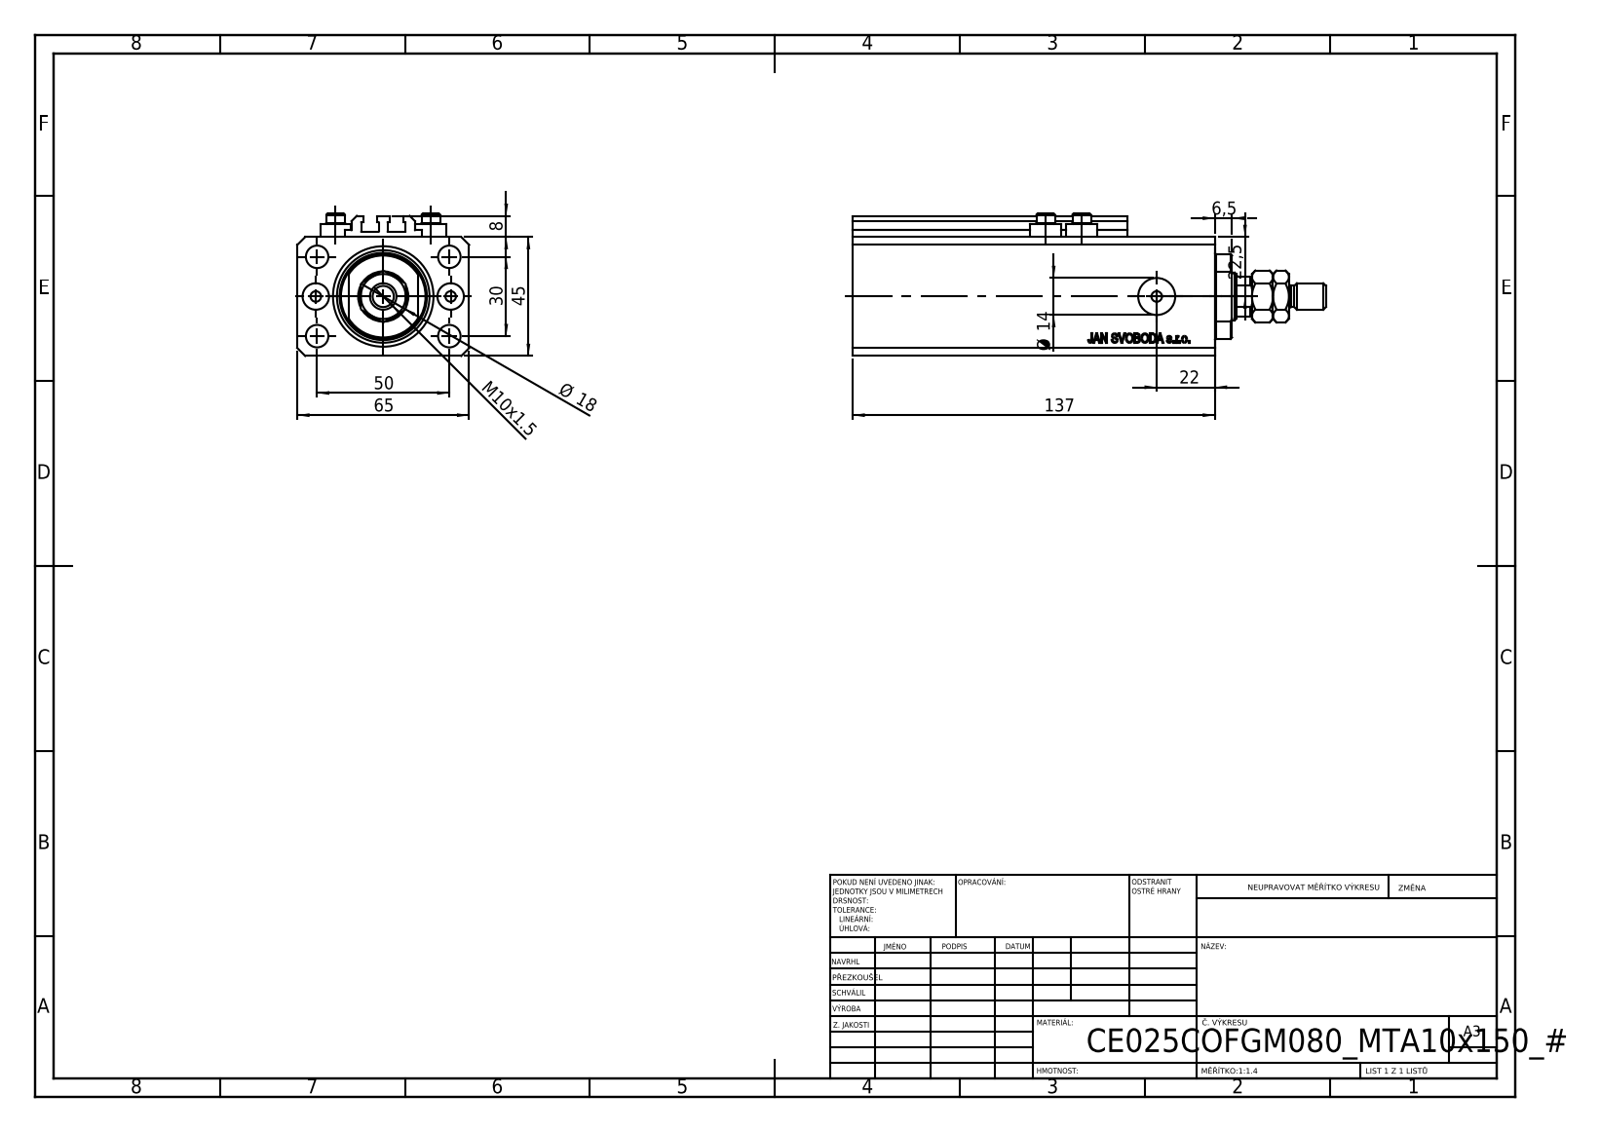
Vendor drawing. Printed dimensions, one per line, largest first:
137
65
50
45
30
22,5
22
Ø 18
Ø 14
M10x1.5
8
6,5
